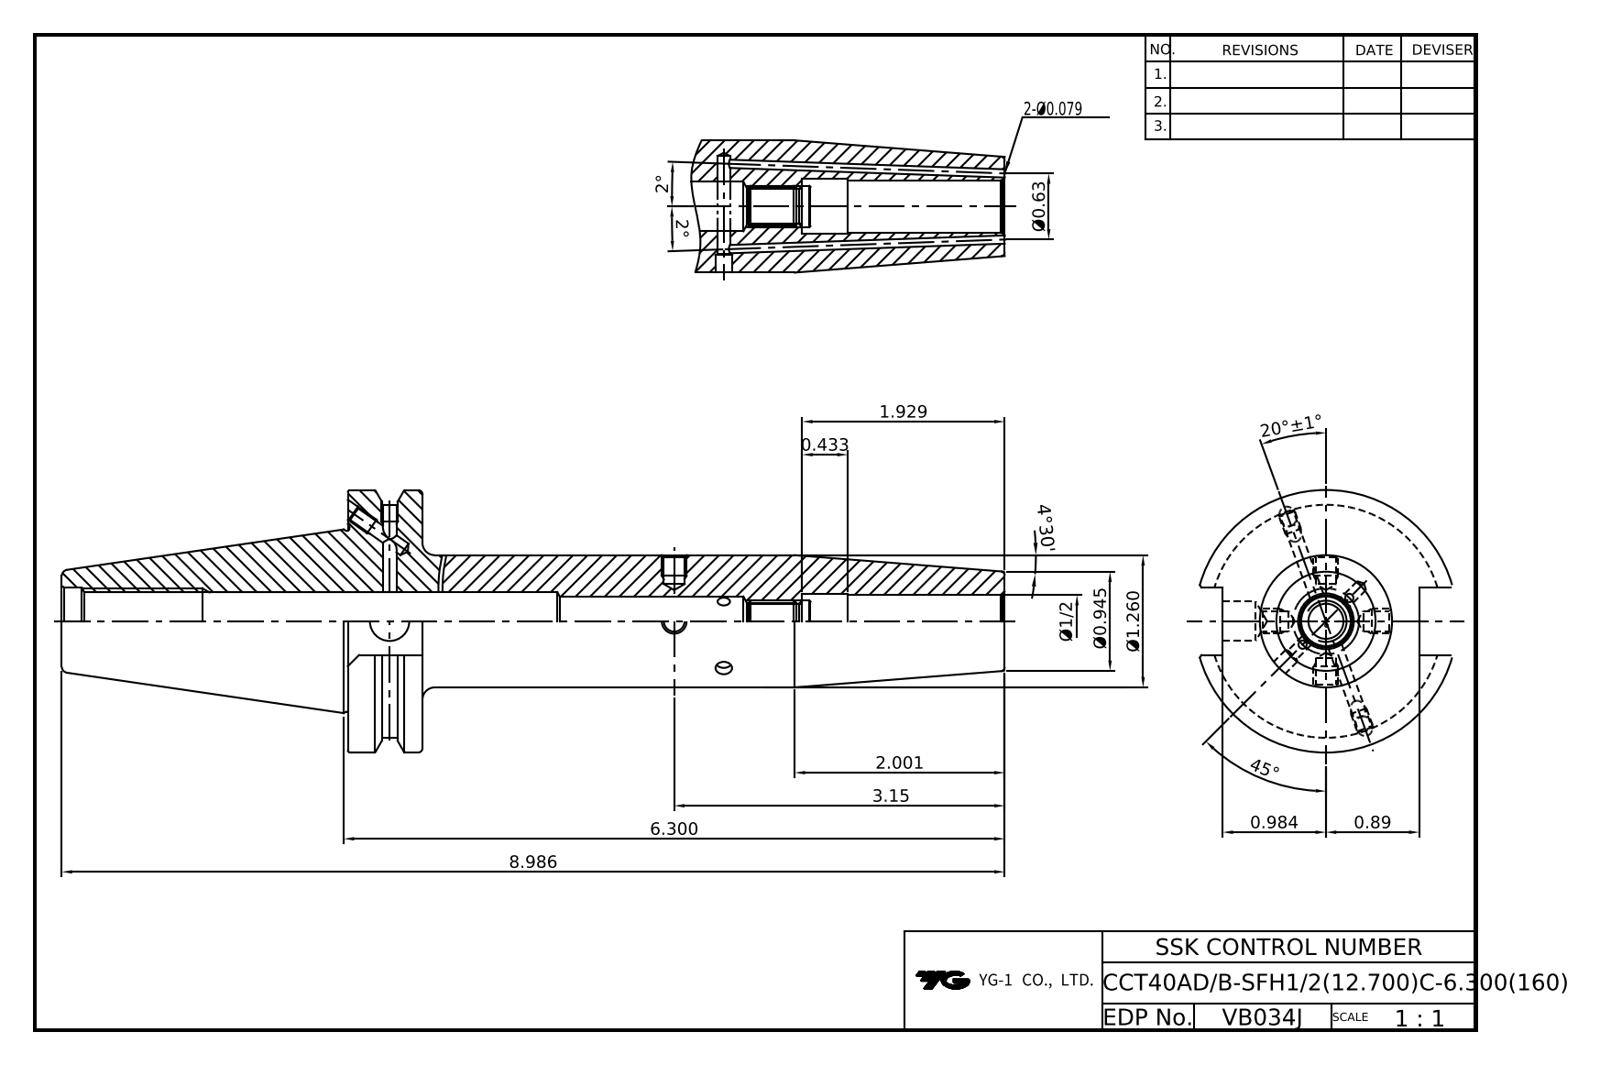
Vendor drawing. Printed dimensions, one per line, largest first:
45°
20°±1°
8.986
6.300
4°30'
3.15
2.001
2°
2°
1.929
Ø1.260
0.984
Ø0.945
0.89
Ø0.63
0.433
